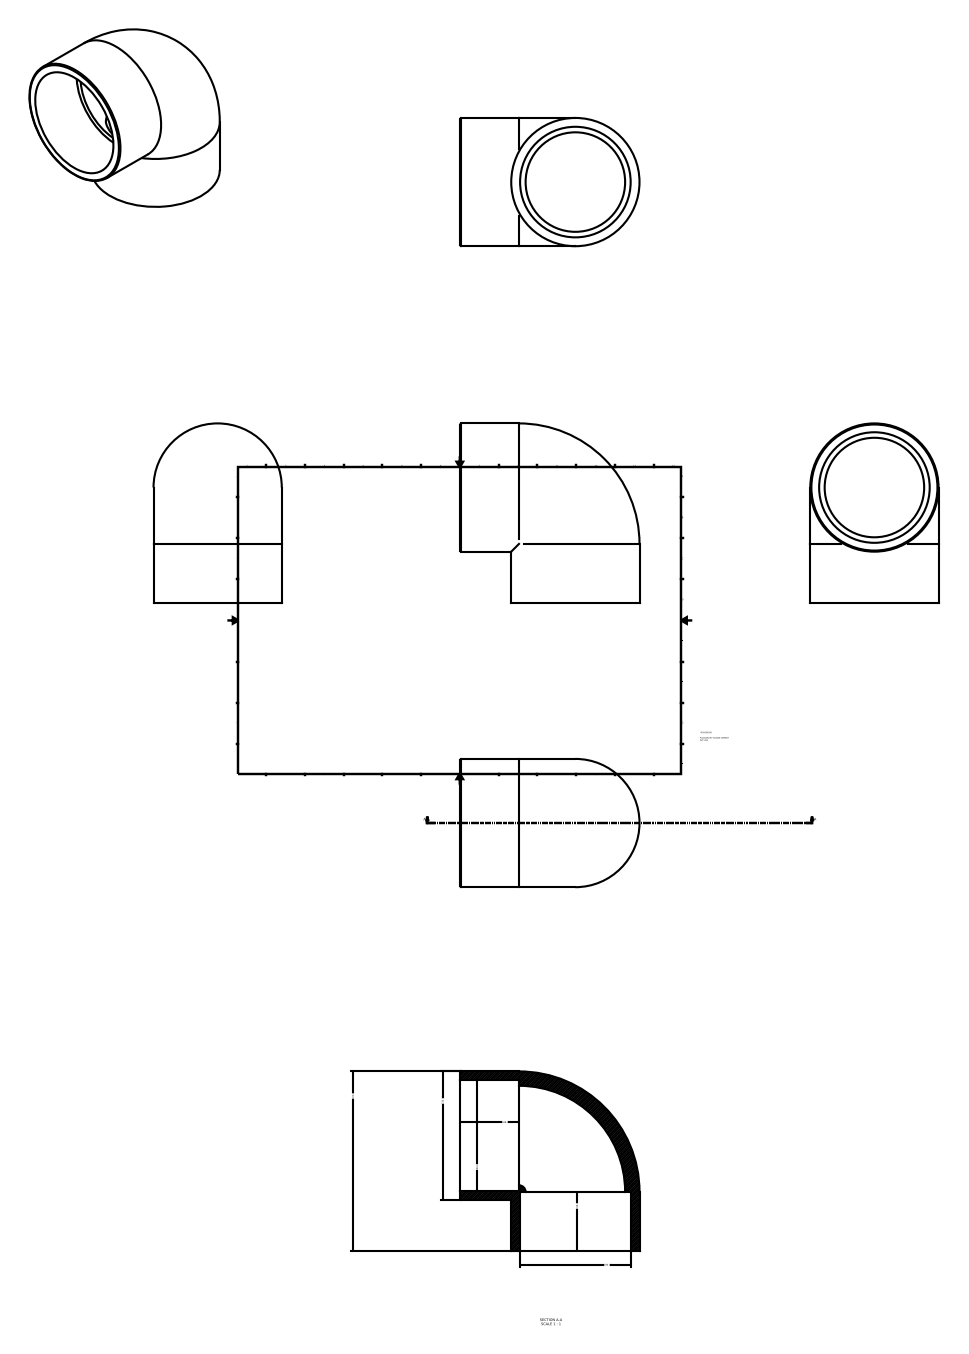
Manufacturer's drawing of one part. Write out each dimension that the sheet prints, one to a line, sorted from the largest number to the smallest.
324.00
232.00
200.00
200.00
106.00
106.00
